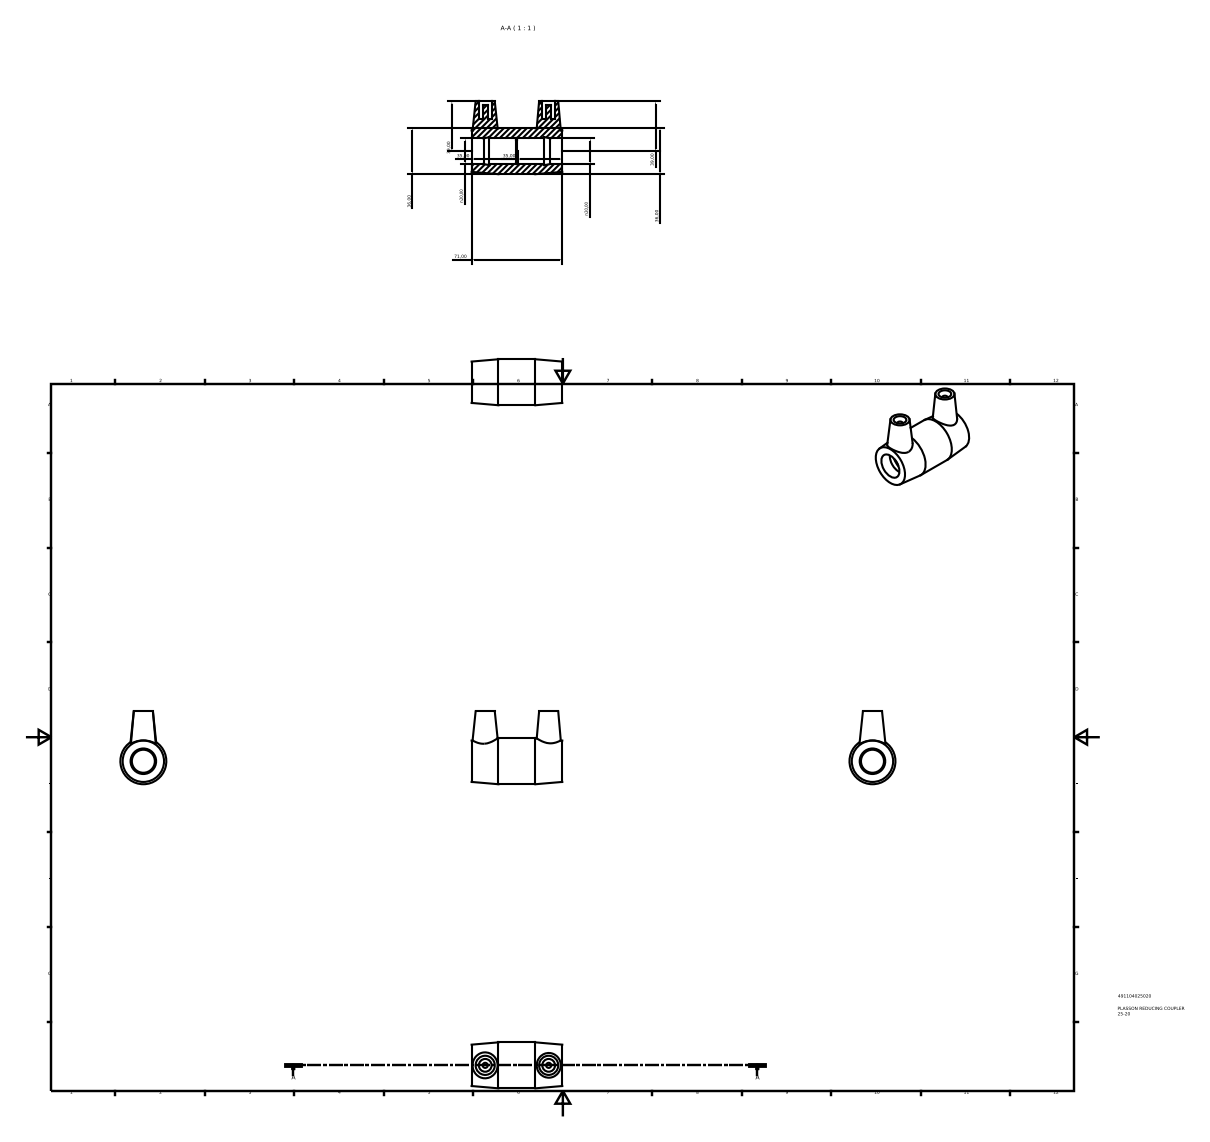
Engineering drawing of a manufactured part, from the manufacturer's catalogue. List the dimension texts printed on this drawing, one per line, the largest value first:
71,00
39,00
39,00
36,00
36,00
35,00
35,00
n20,00
n20,00
